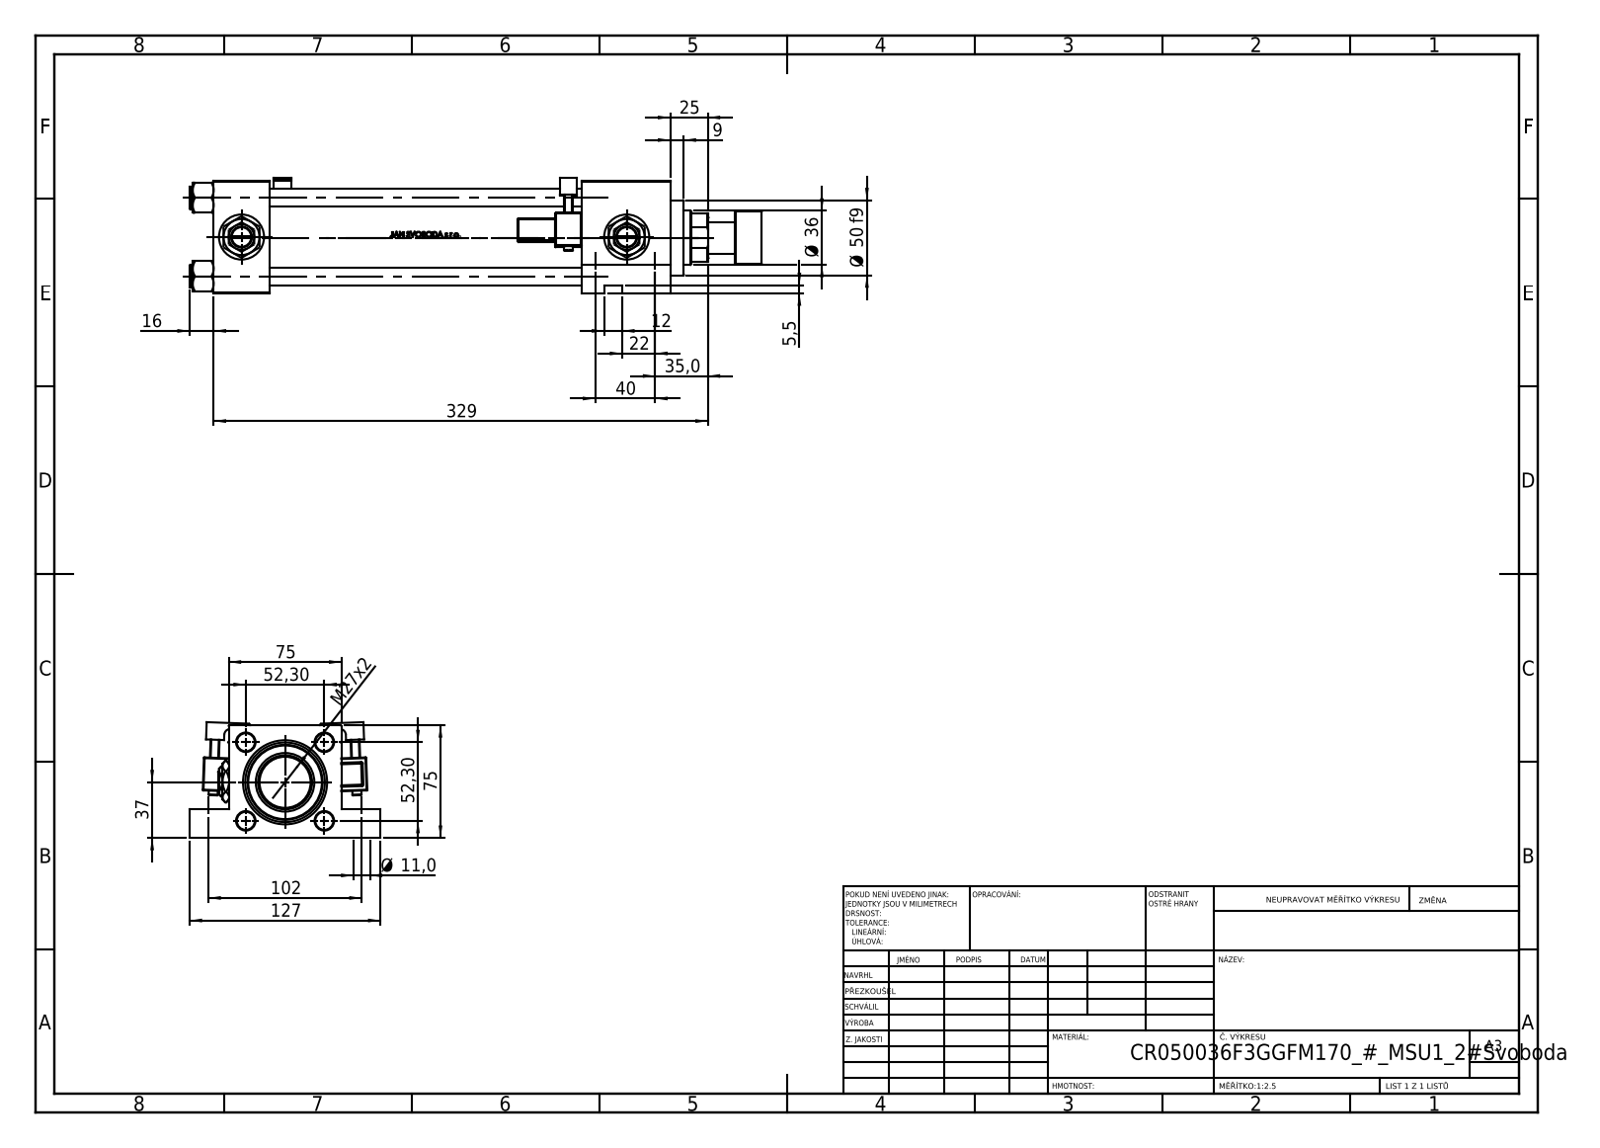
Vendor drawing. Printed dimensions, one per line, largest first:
329
127
102
75
75
52,30
52,30
Ø 50 f9
40
37
Ø 36
35,0
M27x2
25
22
16
12
Ø 11,0
9
5,5
